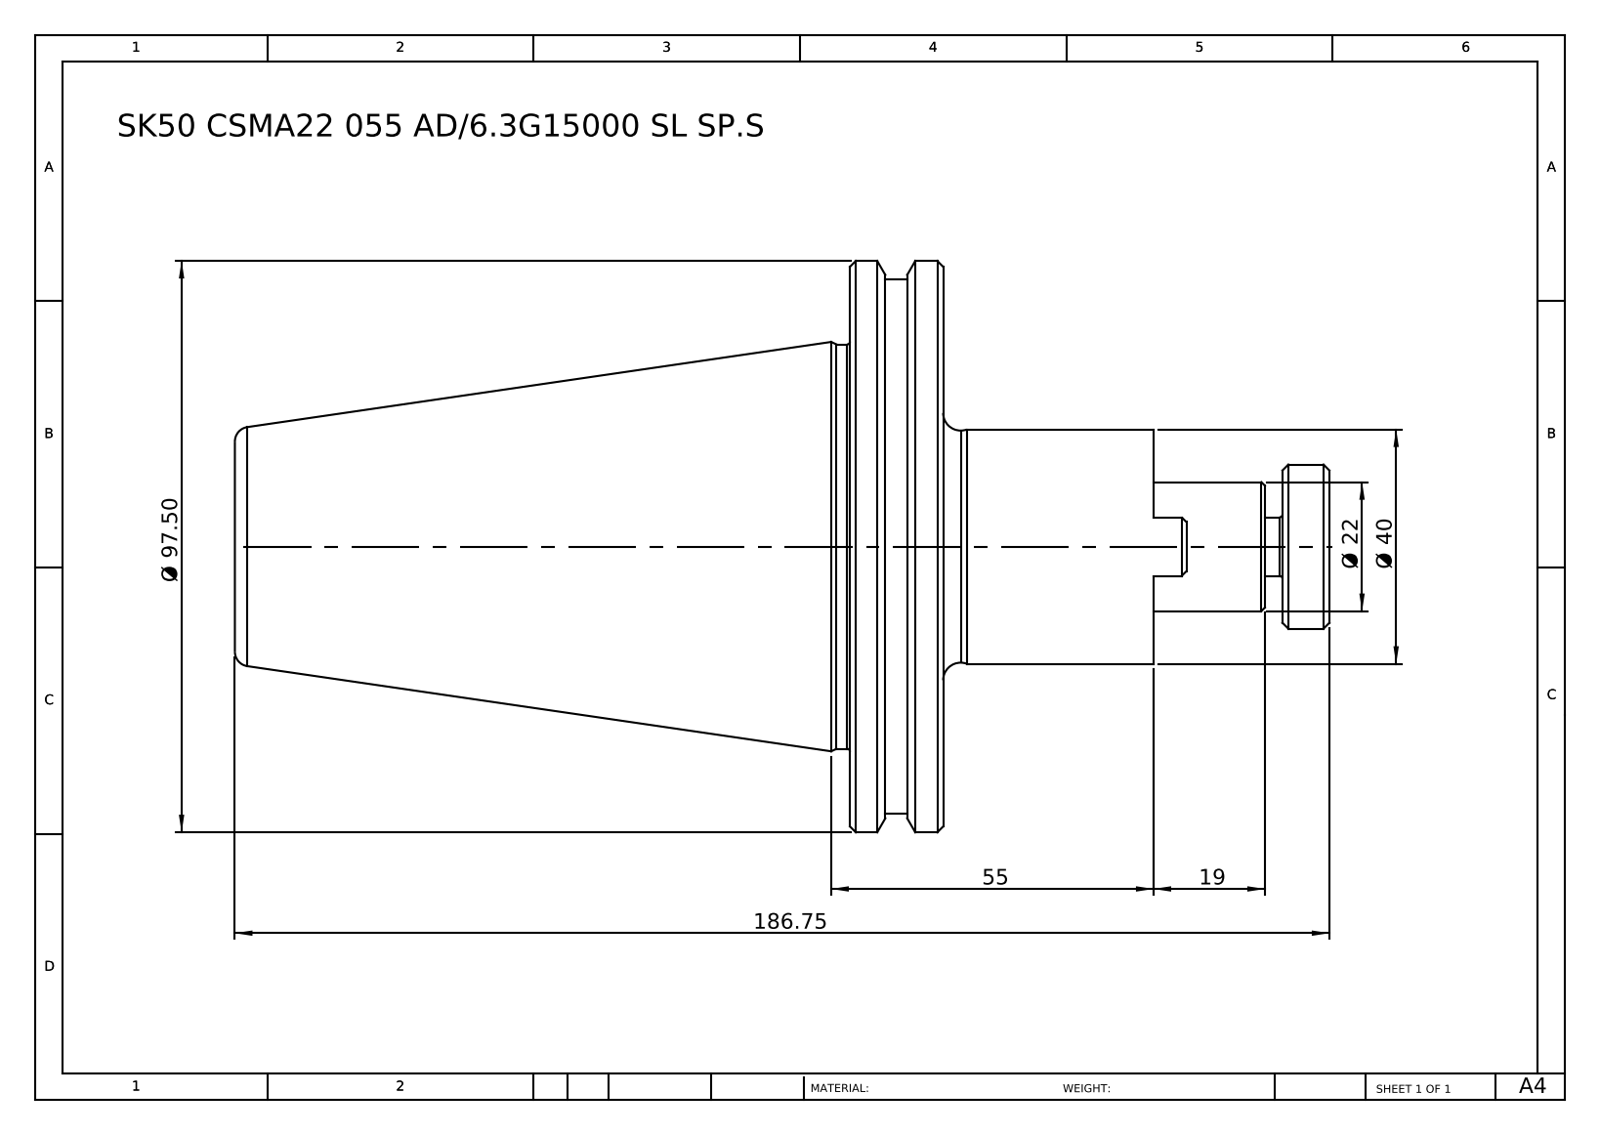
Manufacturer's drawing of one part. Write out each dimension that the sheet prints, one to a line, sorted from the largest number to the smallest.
186.75
Ø 97.50
55
Ø 40
Ø 22
19
